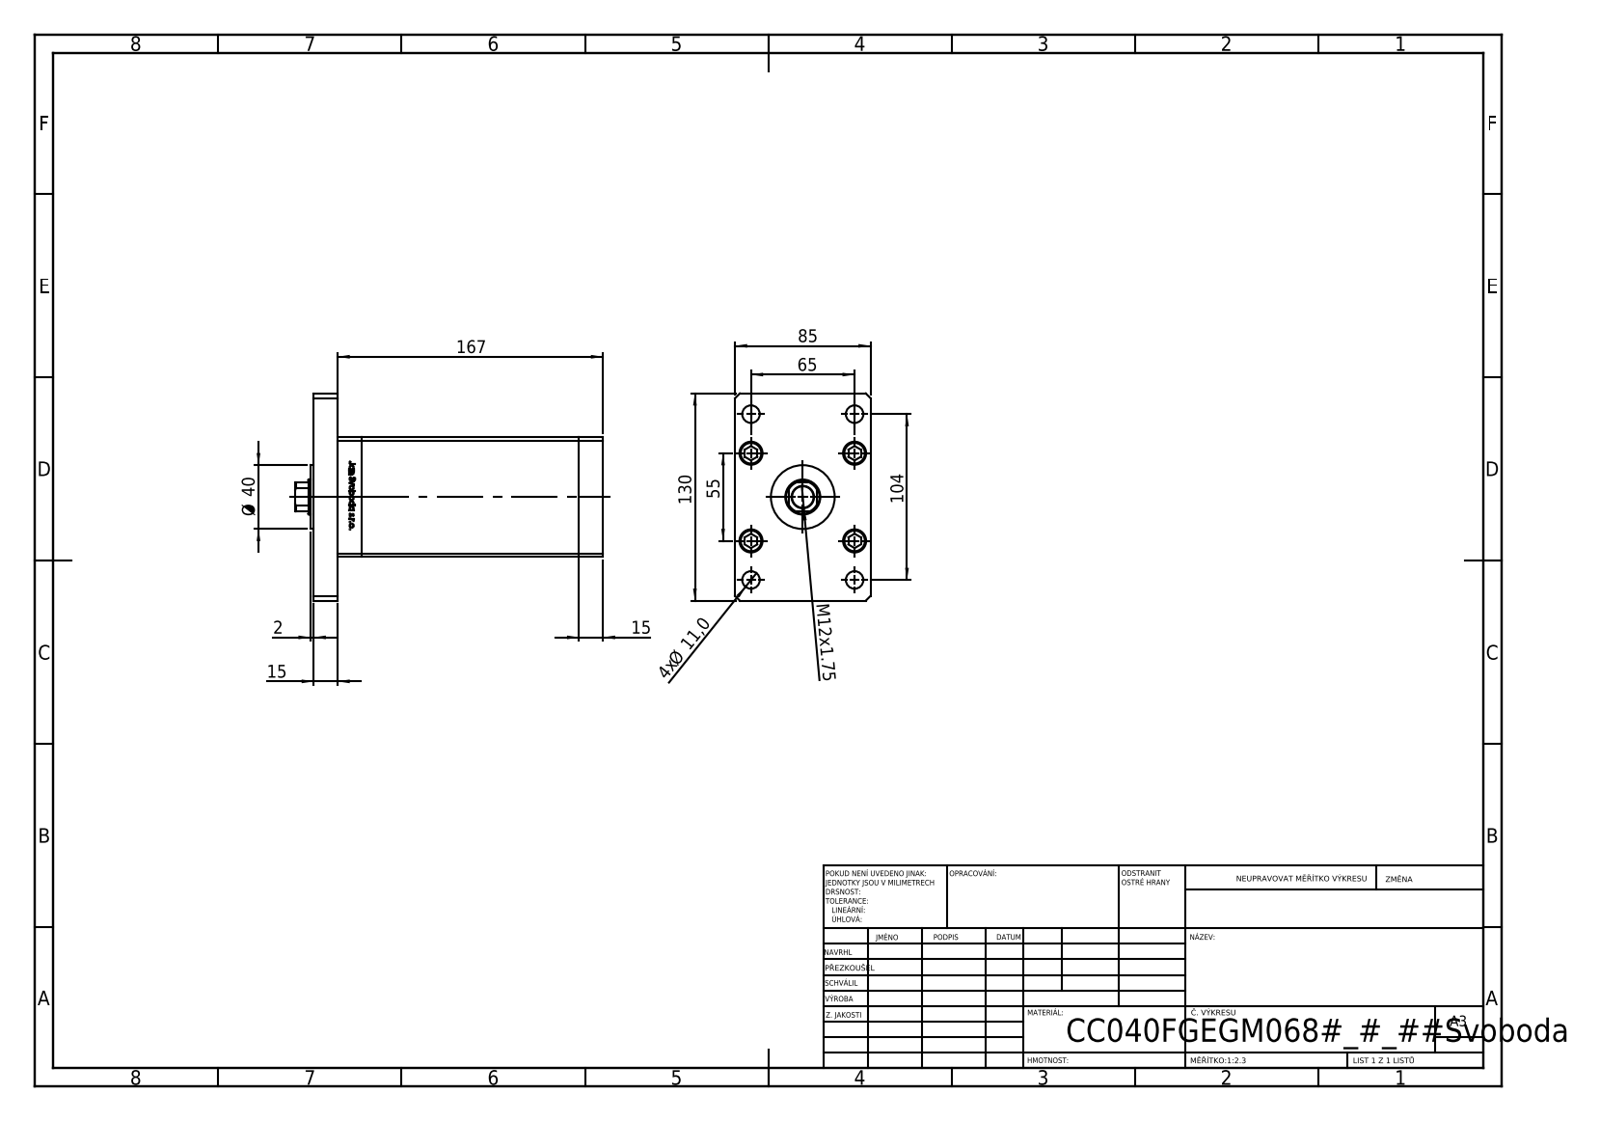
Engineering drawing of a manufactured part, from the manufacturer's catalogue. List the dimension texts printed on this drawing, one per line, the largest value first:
167
130
104
85
65
55
Ø 40
15
15
M12x1.75
4x Ø 11,0
2
